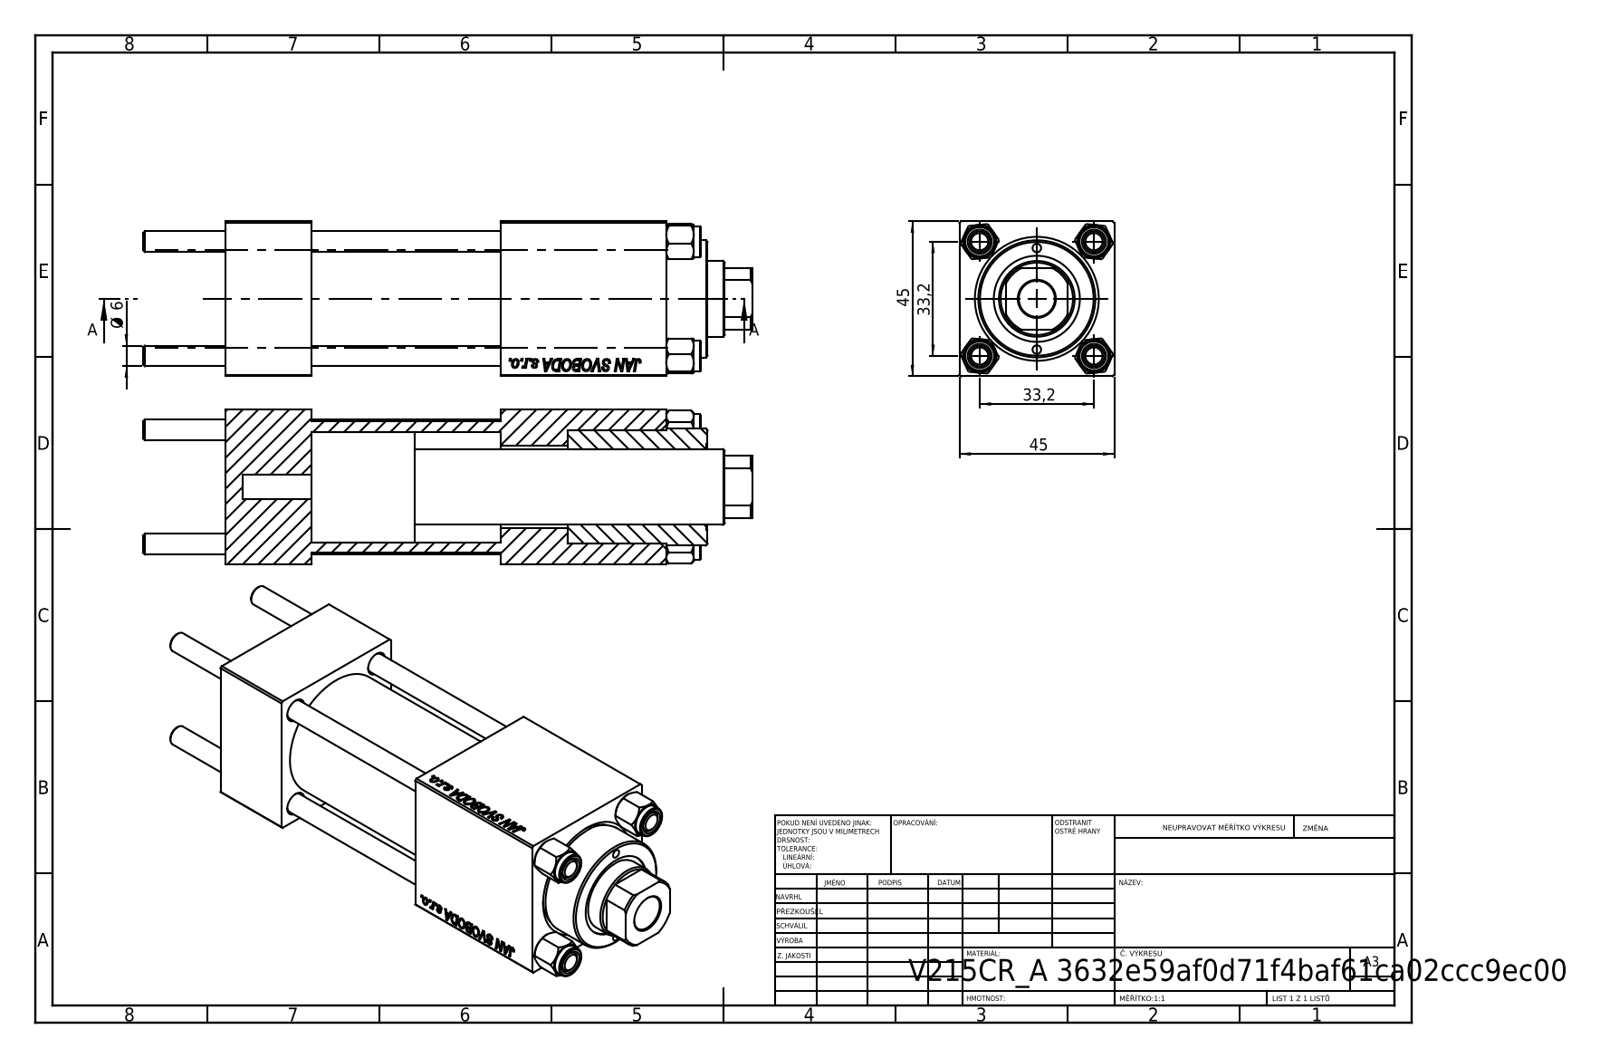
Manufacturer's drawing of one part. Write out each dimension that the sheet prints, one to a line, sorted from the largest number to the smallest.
45
45
33,2
33,2
Ø 6
